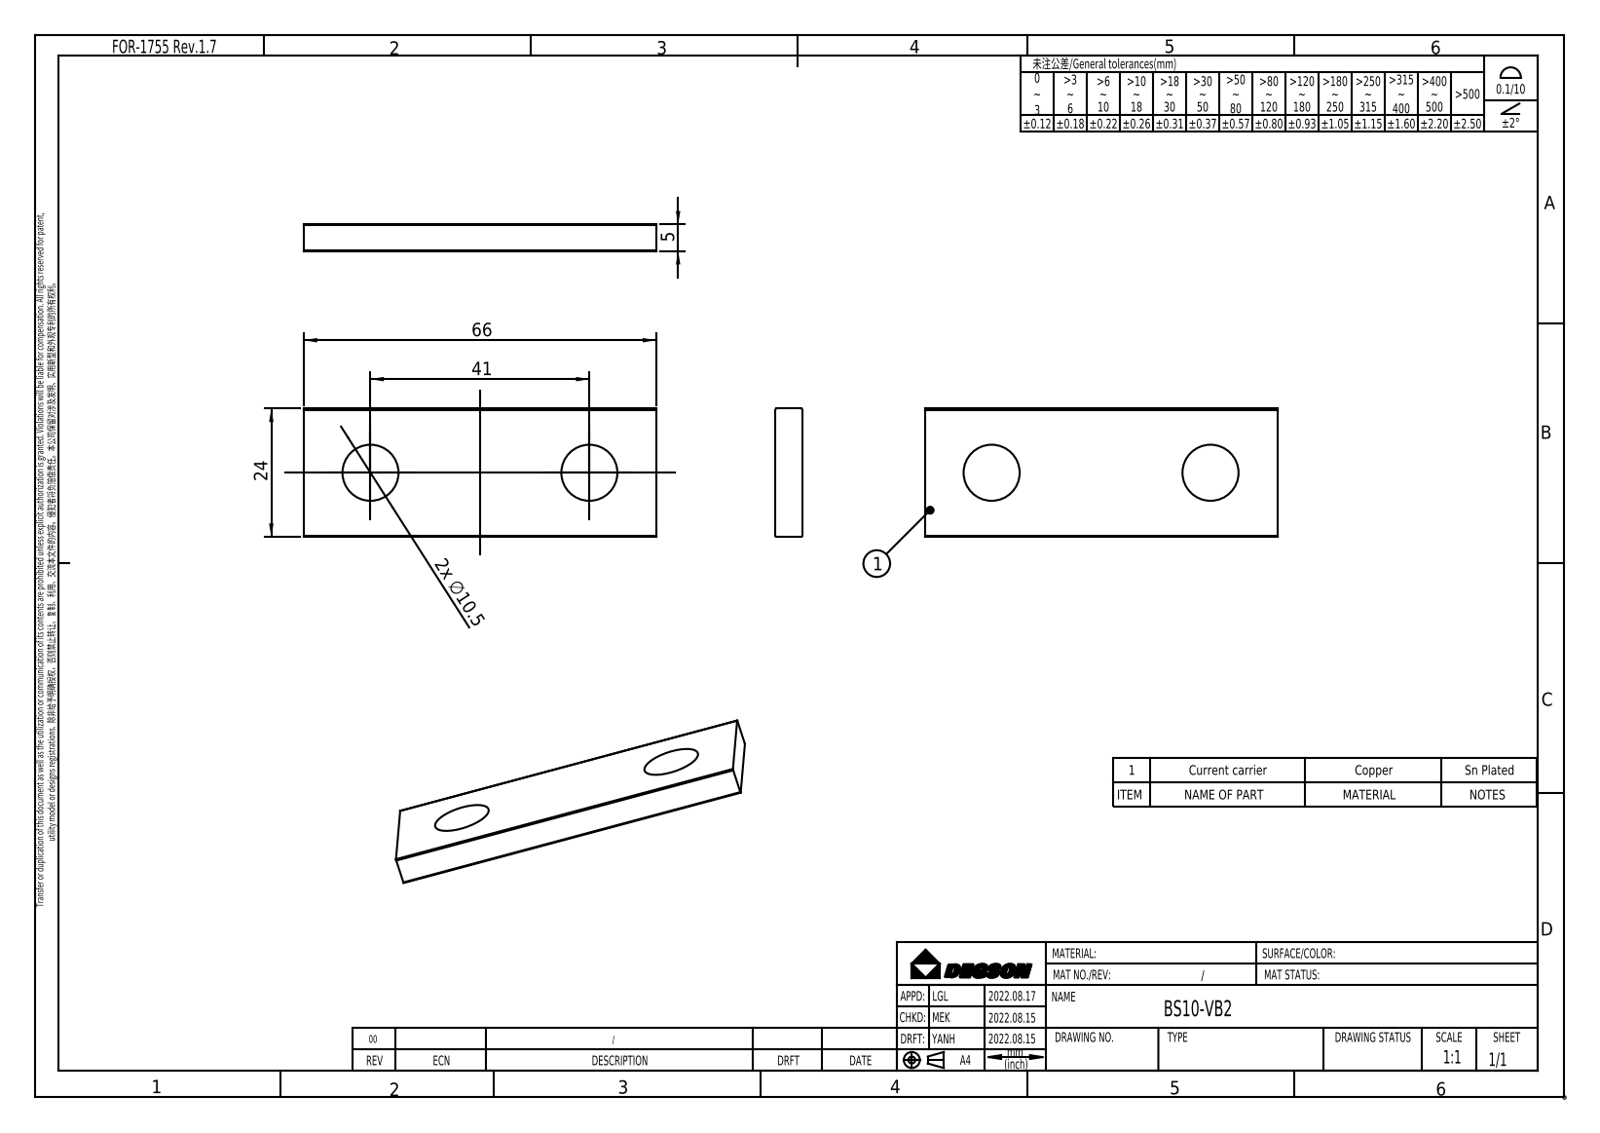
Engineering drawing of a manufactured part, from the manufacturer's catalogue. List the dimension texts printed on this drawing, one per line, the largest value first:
66
41
24
2x ∅10.5
5
